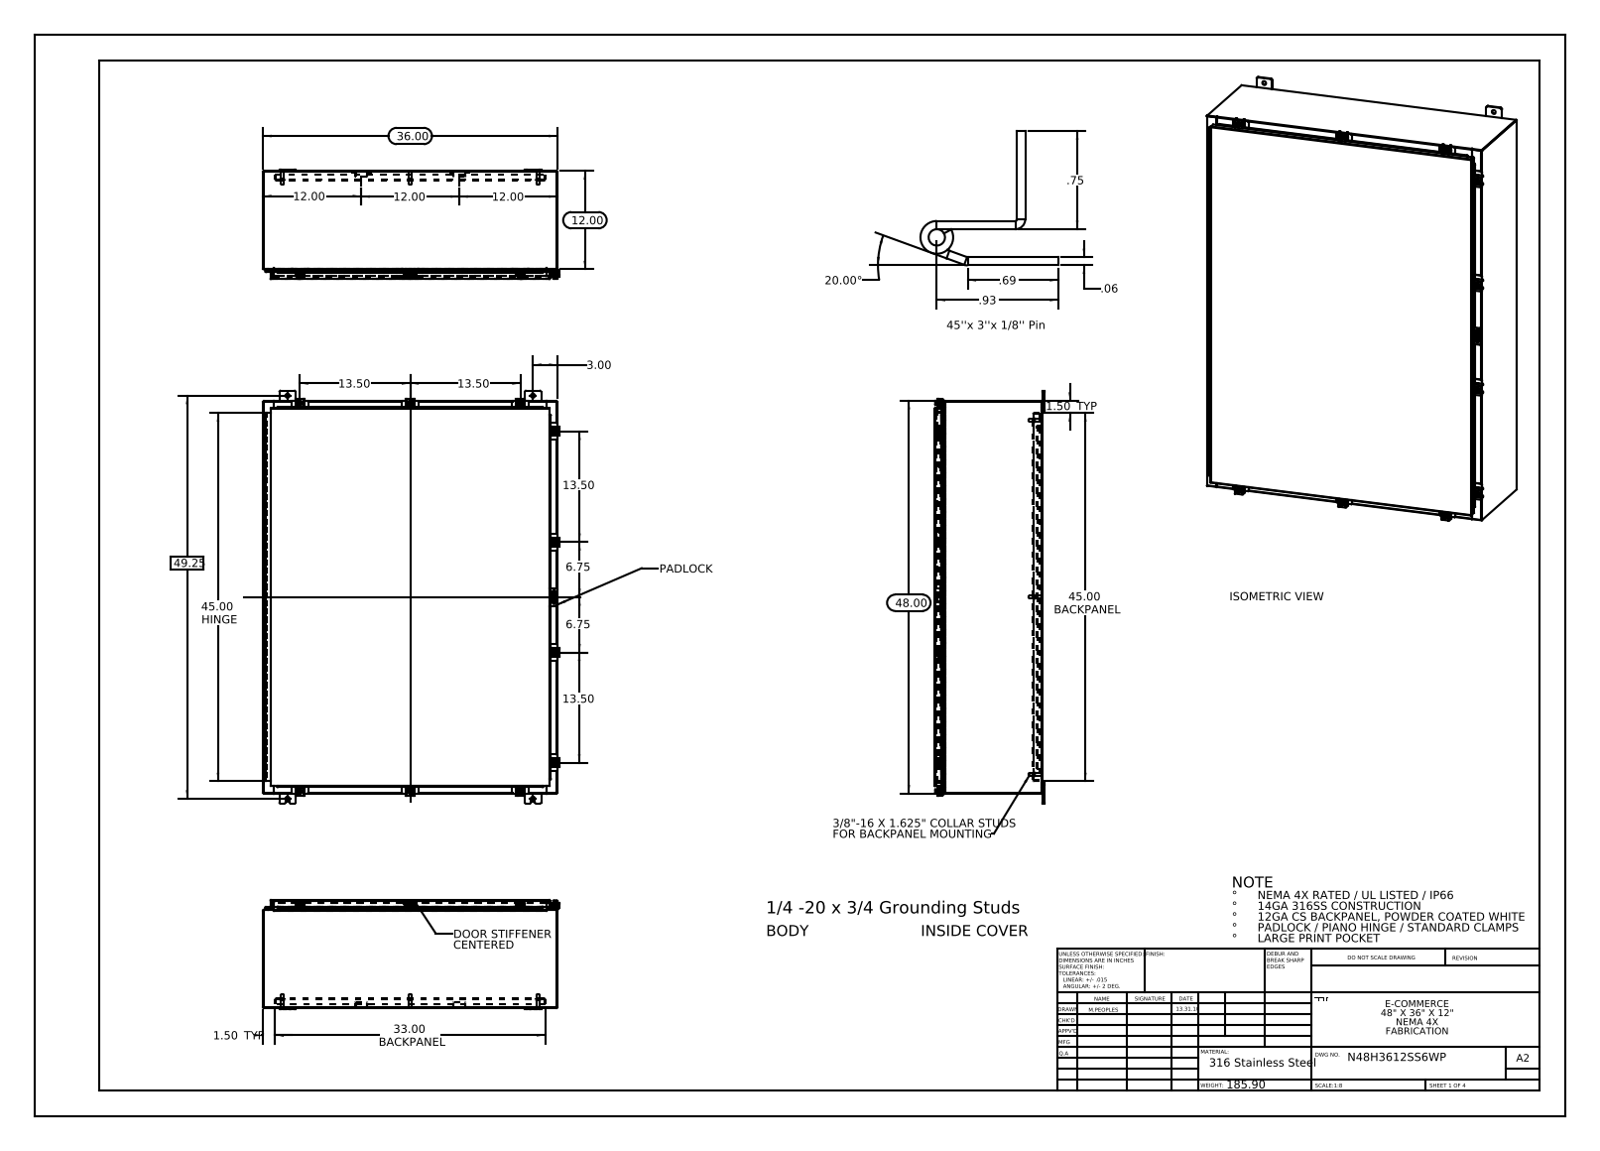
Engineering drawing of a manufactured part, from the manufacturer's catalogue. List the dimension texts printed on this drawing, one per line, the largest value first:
49.25
48.00
45.00 HINGE
45.00 BACKPANEL
36.00
33.00 BACKPANEL
20.00°
13.50
13.50
13.50
13.50
12.00
12.00
12.00
12.00
6.75
6.75
3.00
1.50 TYP
1.50 TYP
.93
.75
.69
.06
